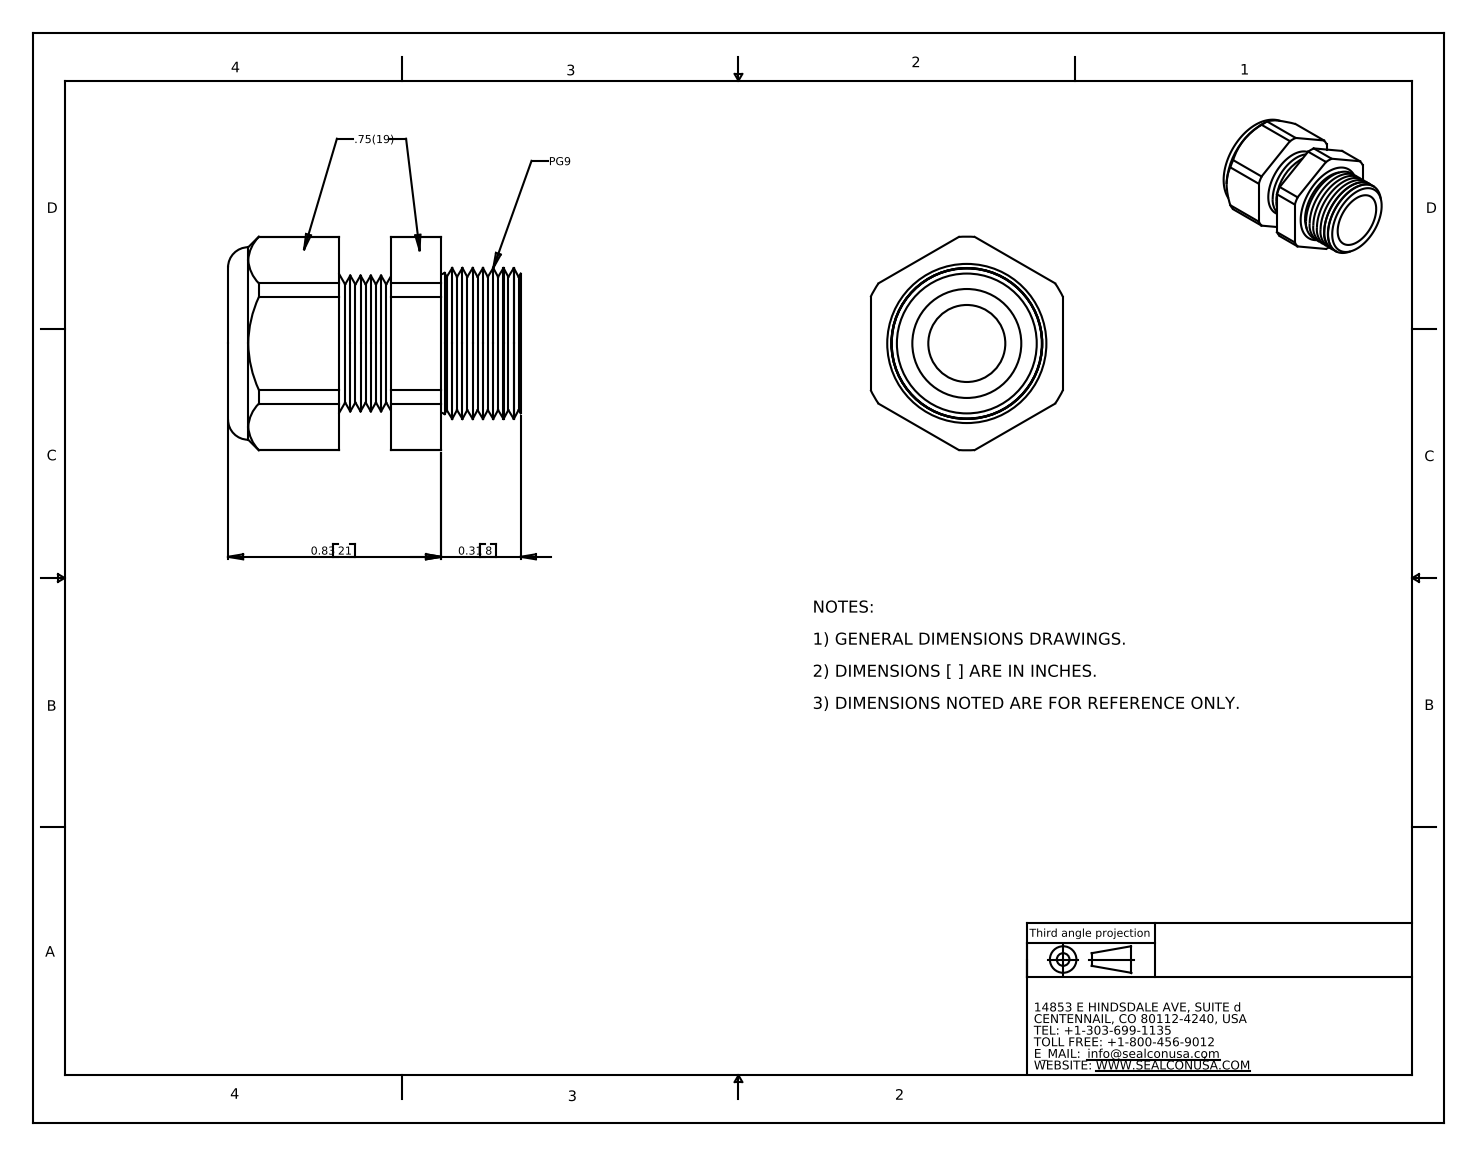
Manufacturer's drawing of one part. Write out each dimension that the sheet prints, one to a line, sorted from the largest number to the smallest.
0.83 21
0.31 8
